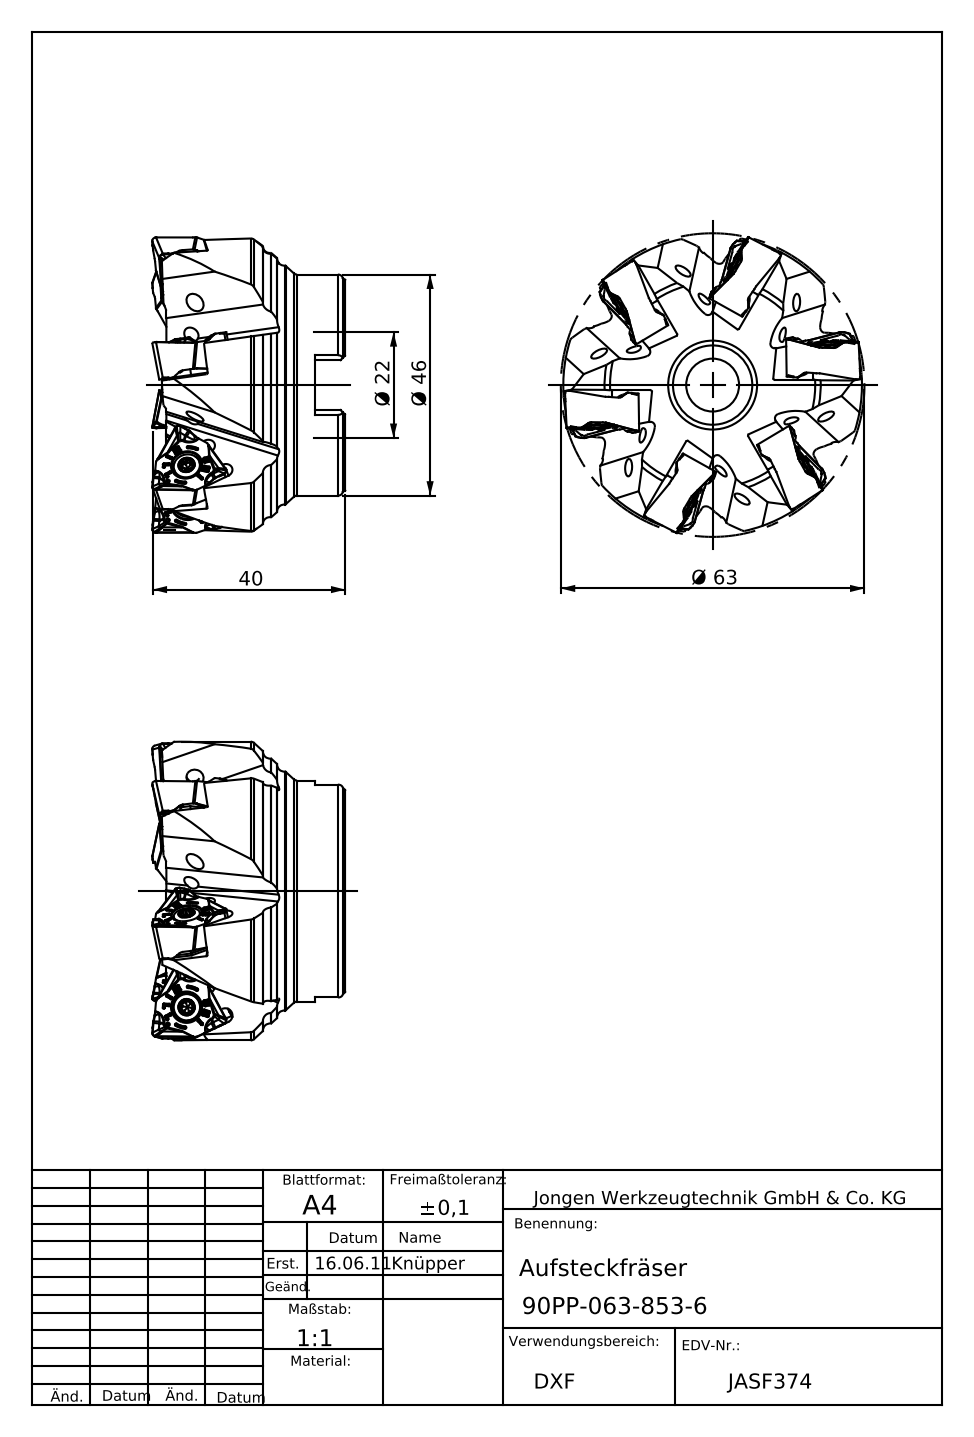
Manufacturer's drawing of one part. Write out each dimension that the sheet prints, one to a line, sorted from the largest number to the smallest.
Ø 63
Ø 46
40
Ø 22
